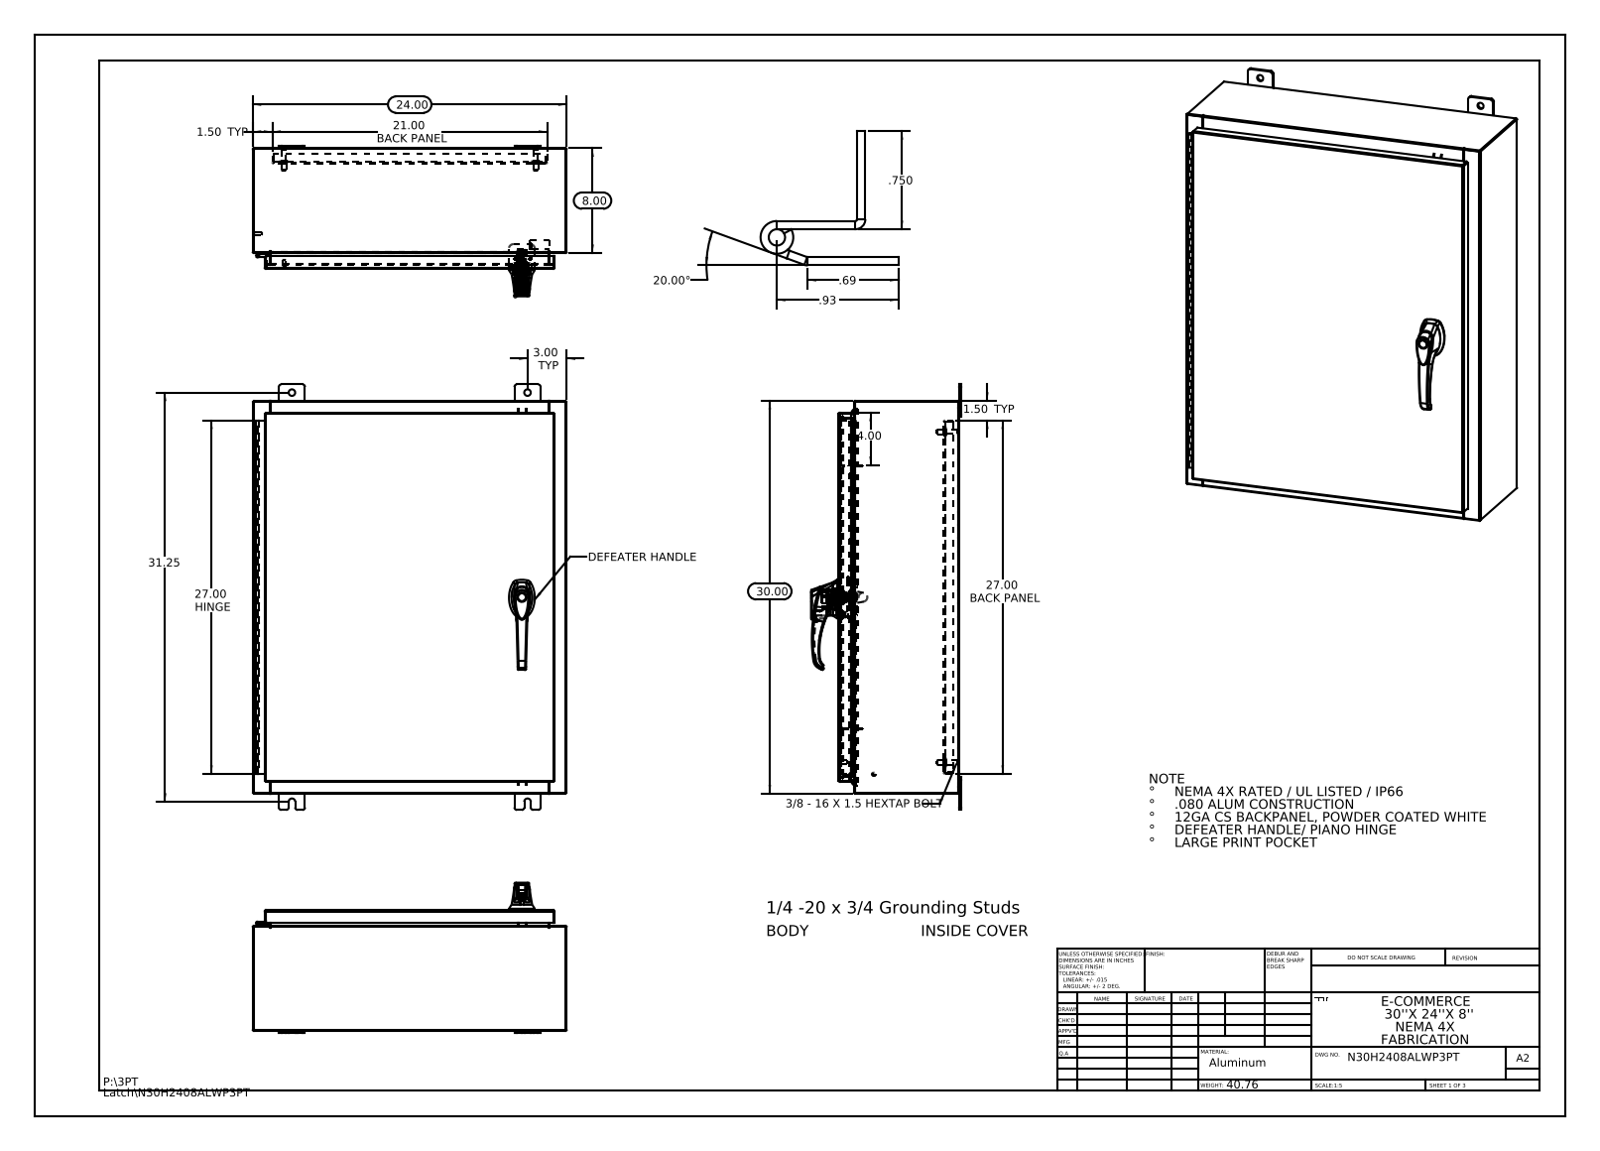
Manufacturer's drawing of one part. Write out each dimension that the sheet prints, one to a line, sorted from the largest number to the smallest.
31.25
30.00
27.00 HINGE
27.00 BACK PANEL
24.00
21.00 BACK PANEL
20.00°
8.00
4.00
3.00 TYP
1.50 TYP
1.50 TYP
.93
.750
.69
